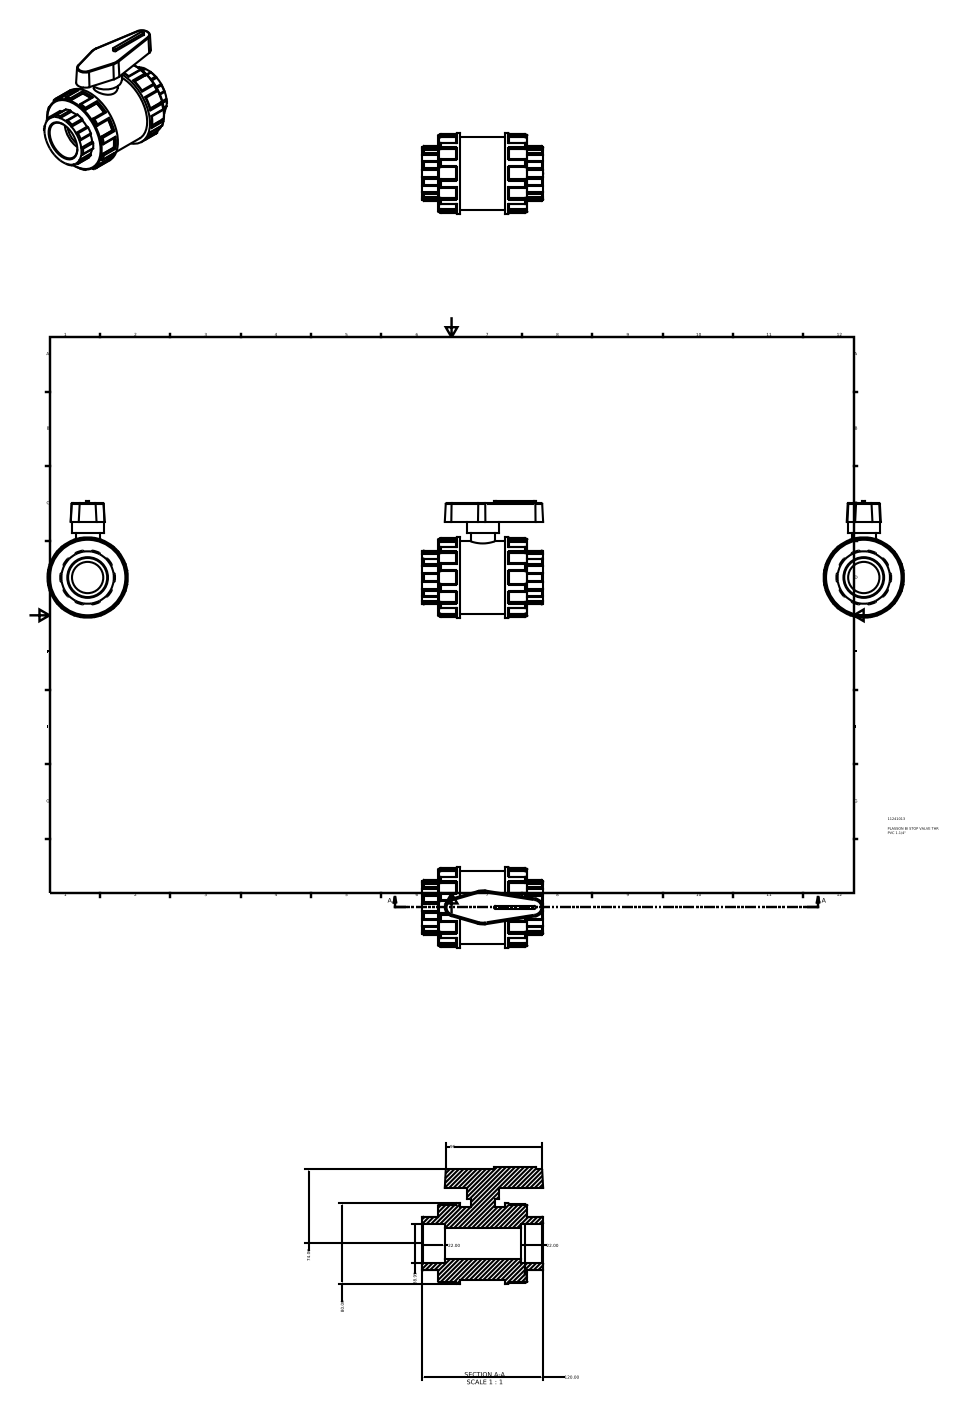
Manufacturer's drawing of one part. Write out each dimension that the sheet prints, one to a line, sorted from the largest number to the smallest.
120.00
96
80.00
74.00
38.95
38.95
22.00
22.00
